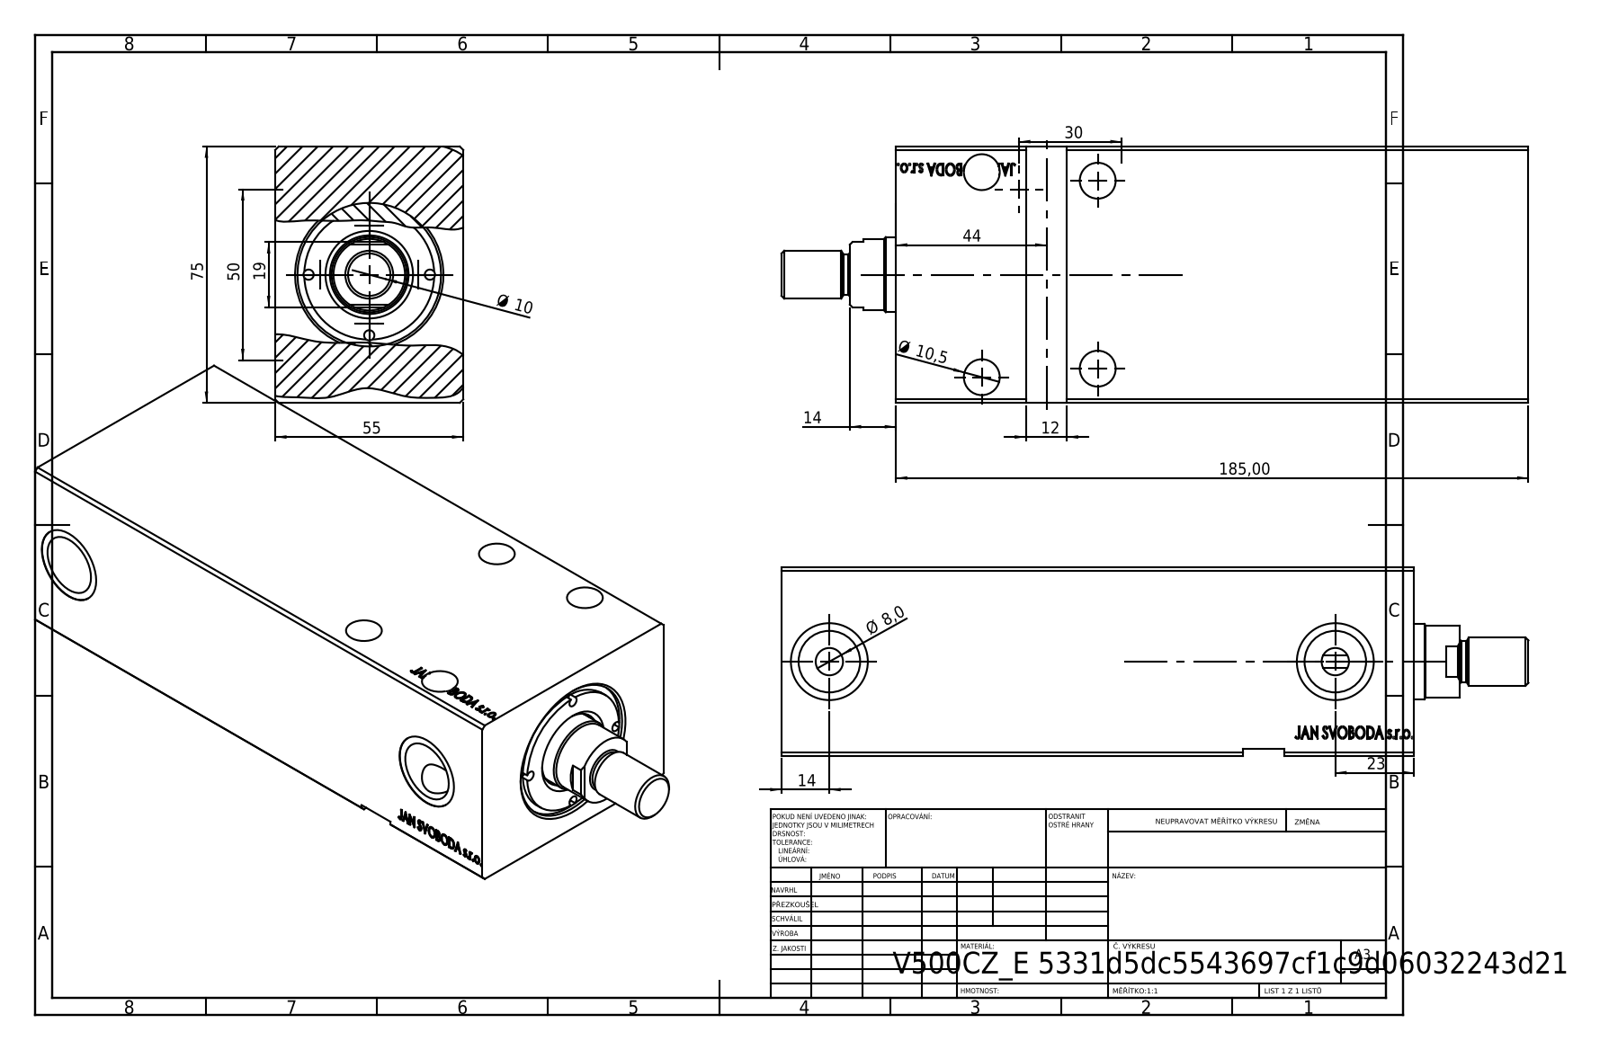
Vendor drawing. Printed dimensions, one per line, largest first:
185,00
75
55
50
44
30
23
19
14
14
12
Ø 10,5
Ø 10
Ø 8,0
